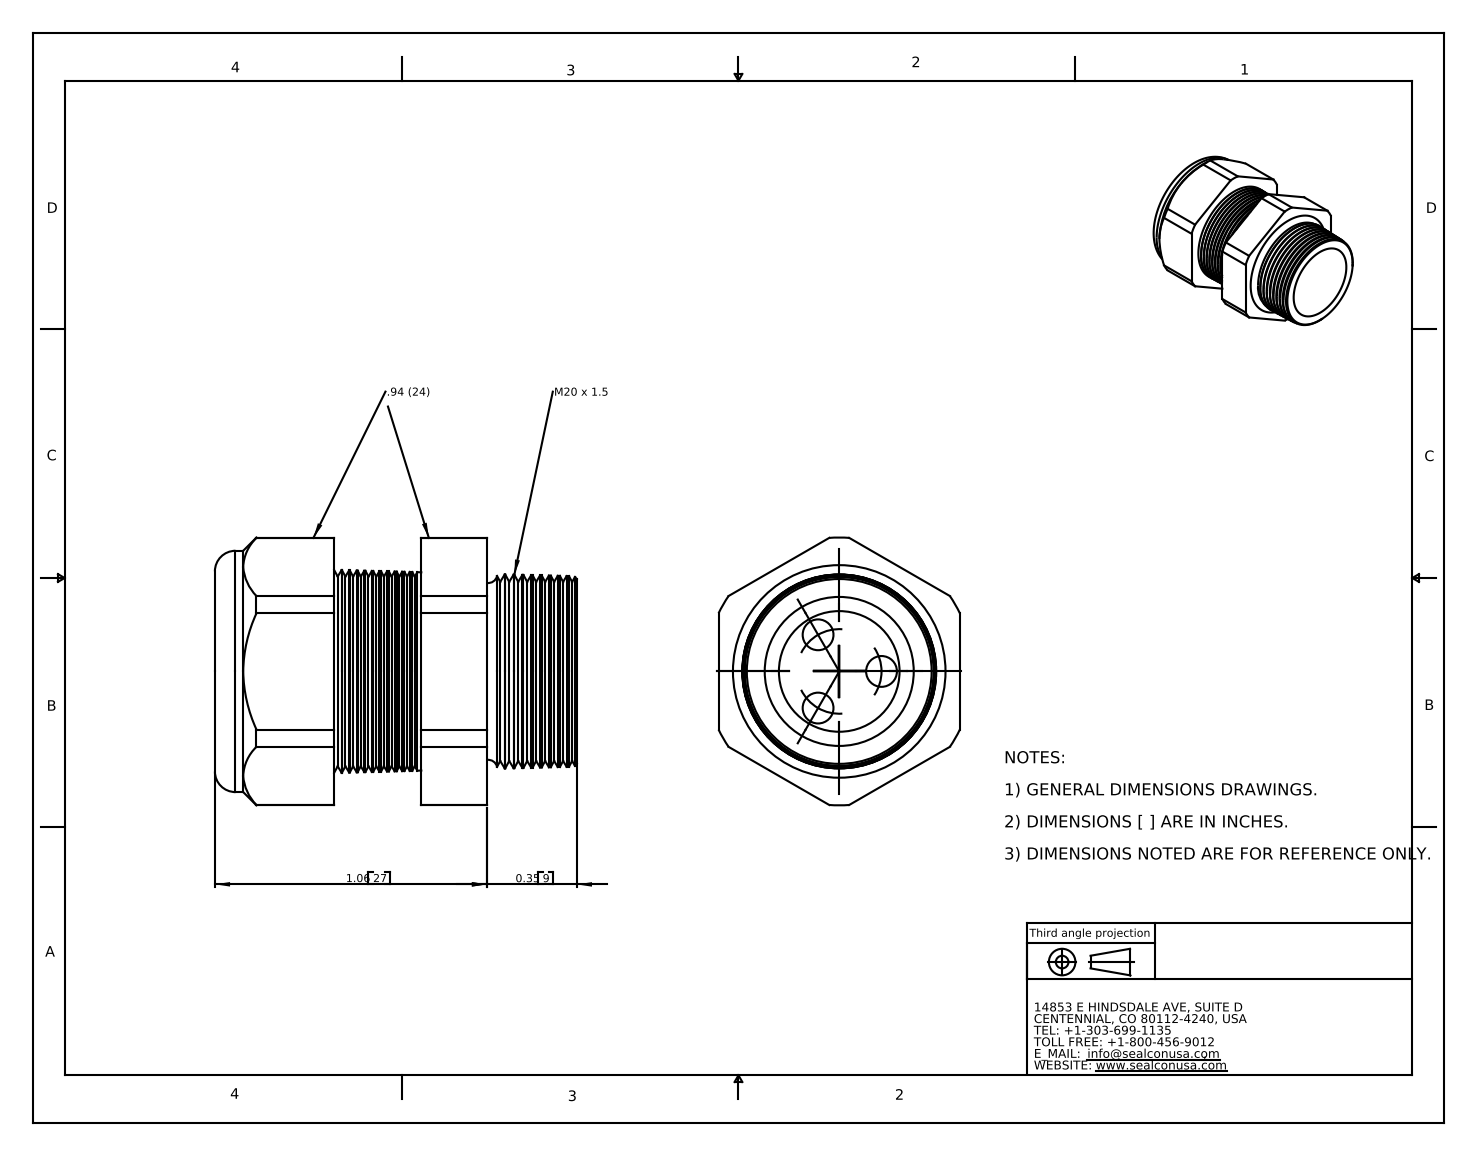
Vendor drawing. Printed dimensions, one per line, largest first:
1.06 27
0.35 9
